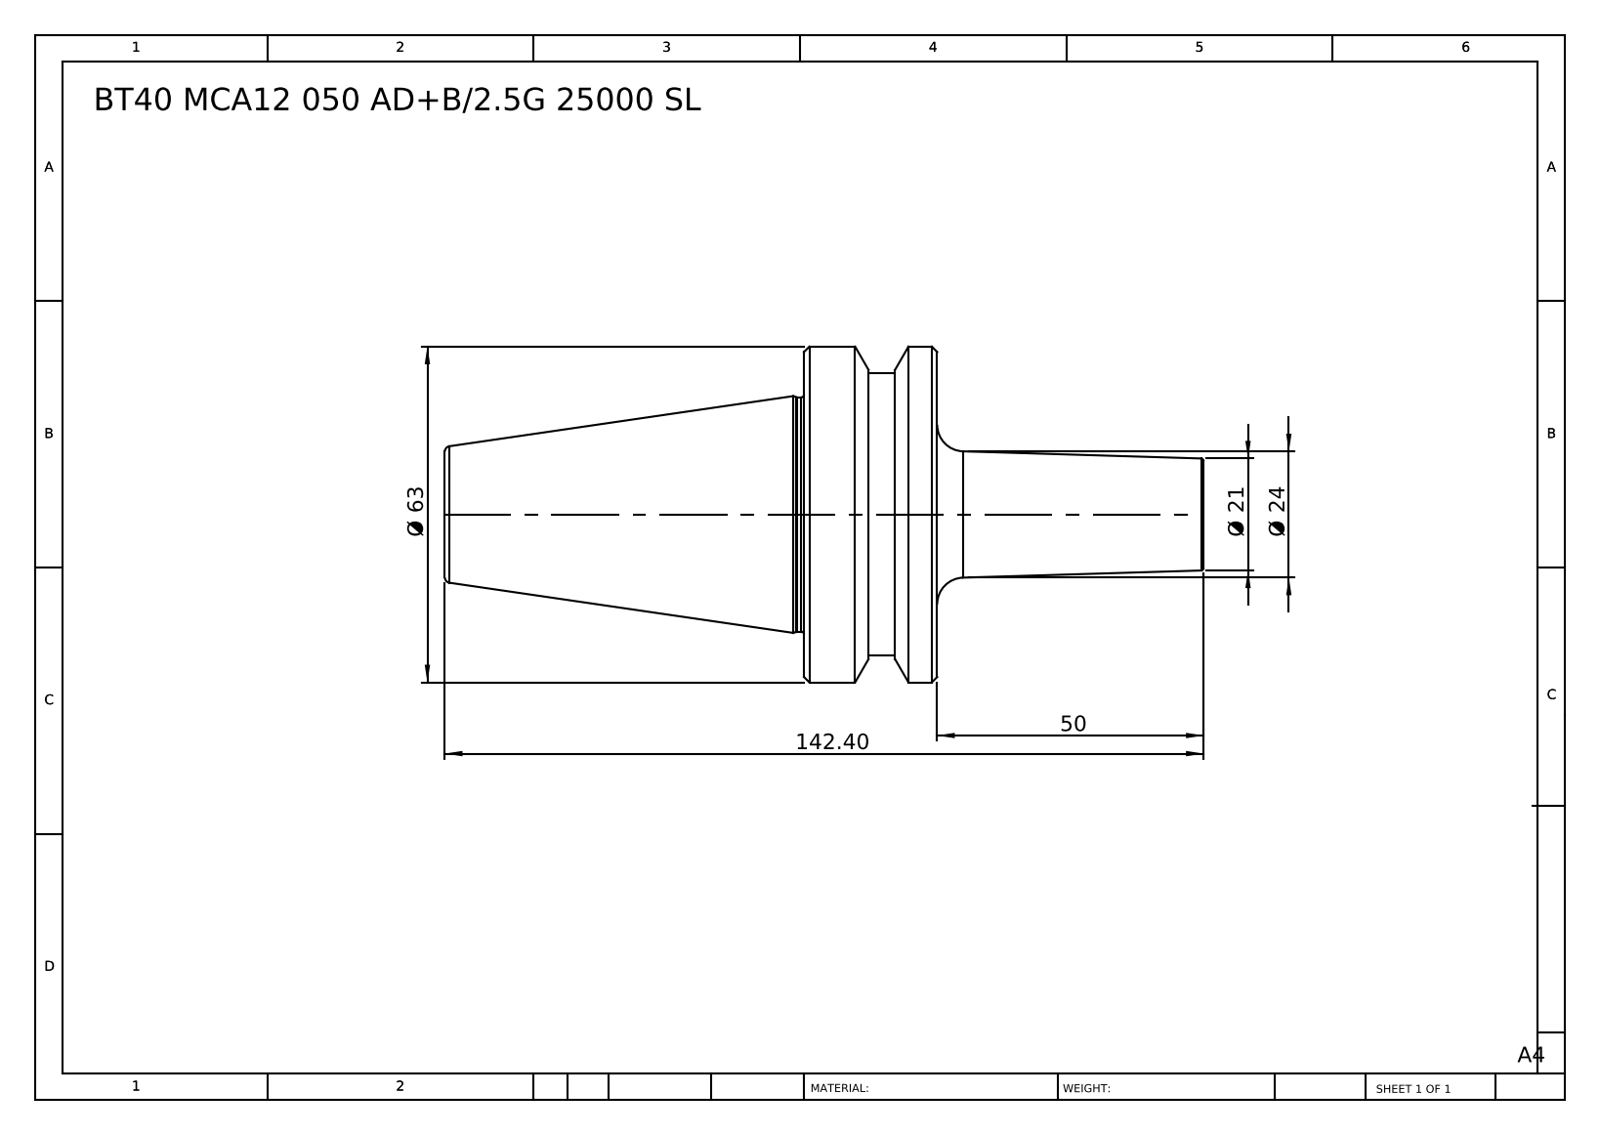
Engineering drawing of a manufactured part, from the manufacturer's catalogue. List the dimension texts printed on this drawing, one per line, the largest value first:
142.40
Ø 63
50
Ø 24
Ø 21
